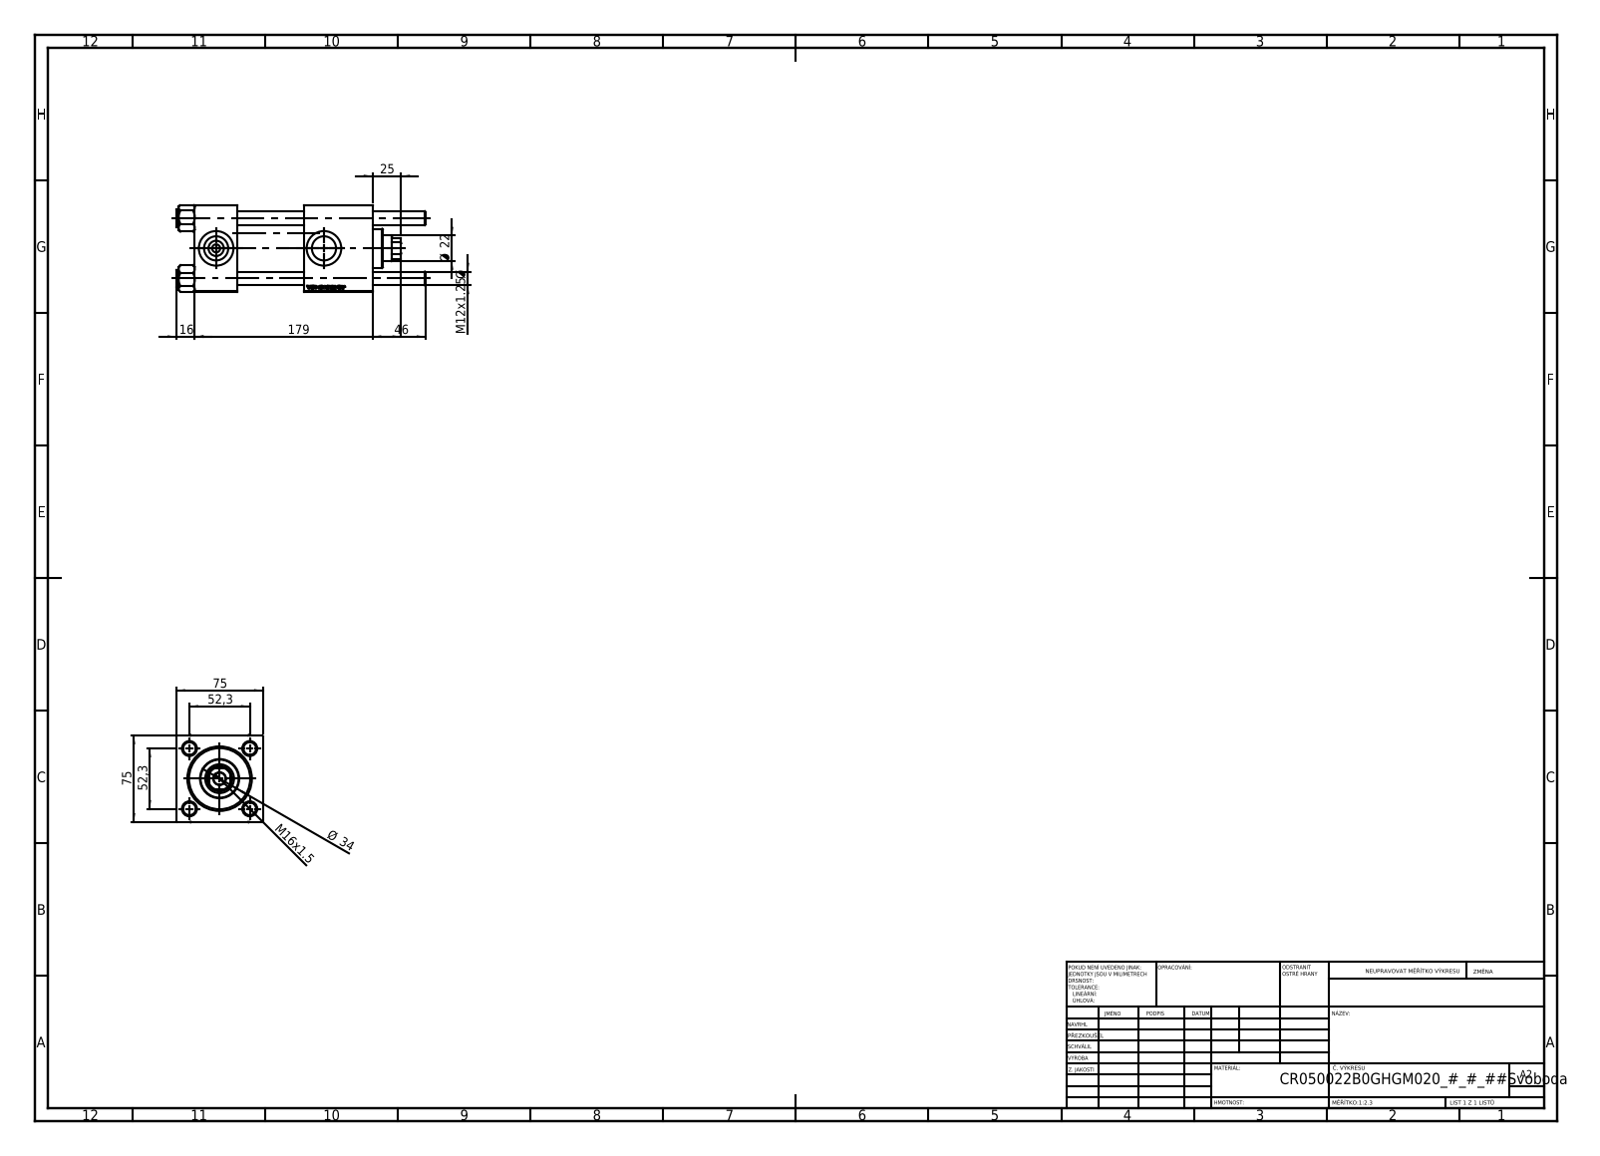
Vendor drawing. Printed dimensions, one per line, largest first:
179
75
75
52,3
52,3
46
Ø 34
25
Ø 22
M16x1.5
16
M12x1.25 Ø
